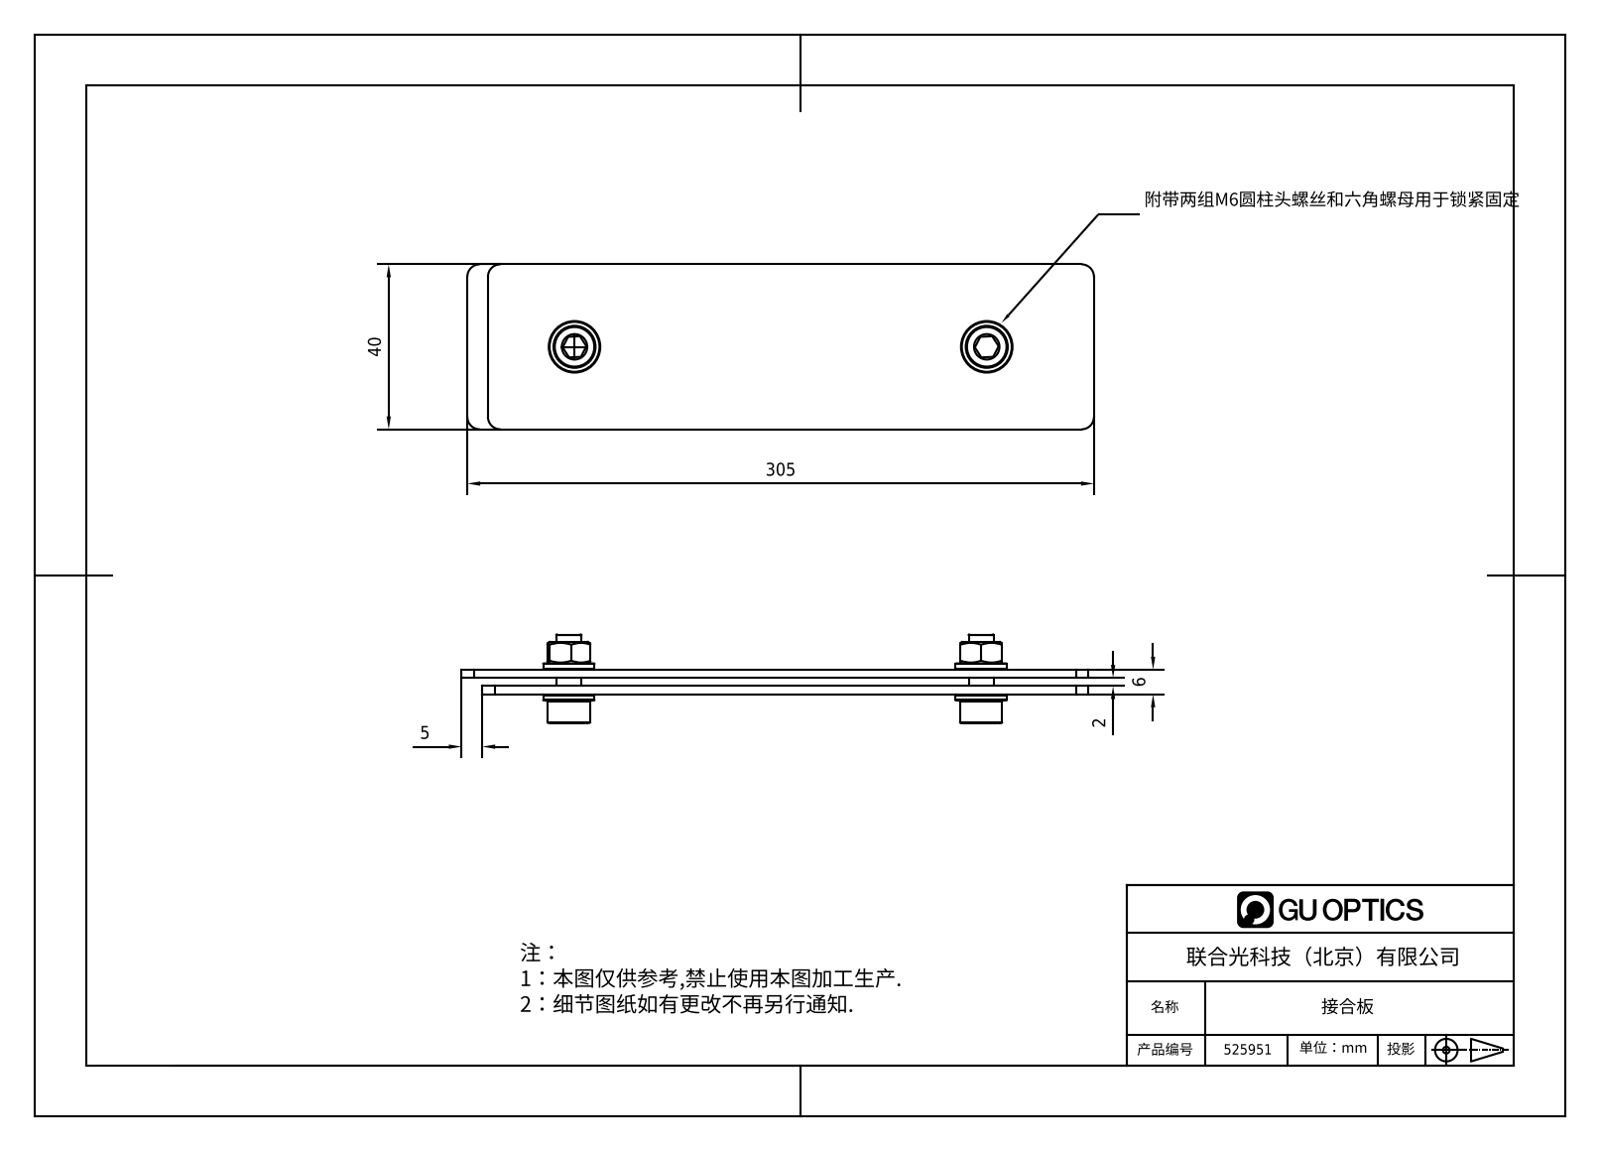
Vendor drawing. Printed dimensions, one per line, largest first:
305
40
6
5
2
